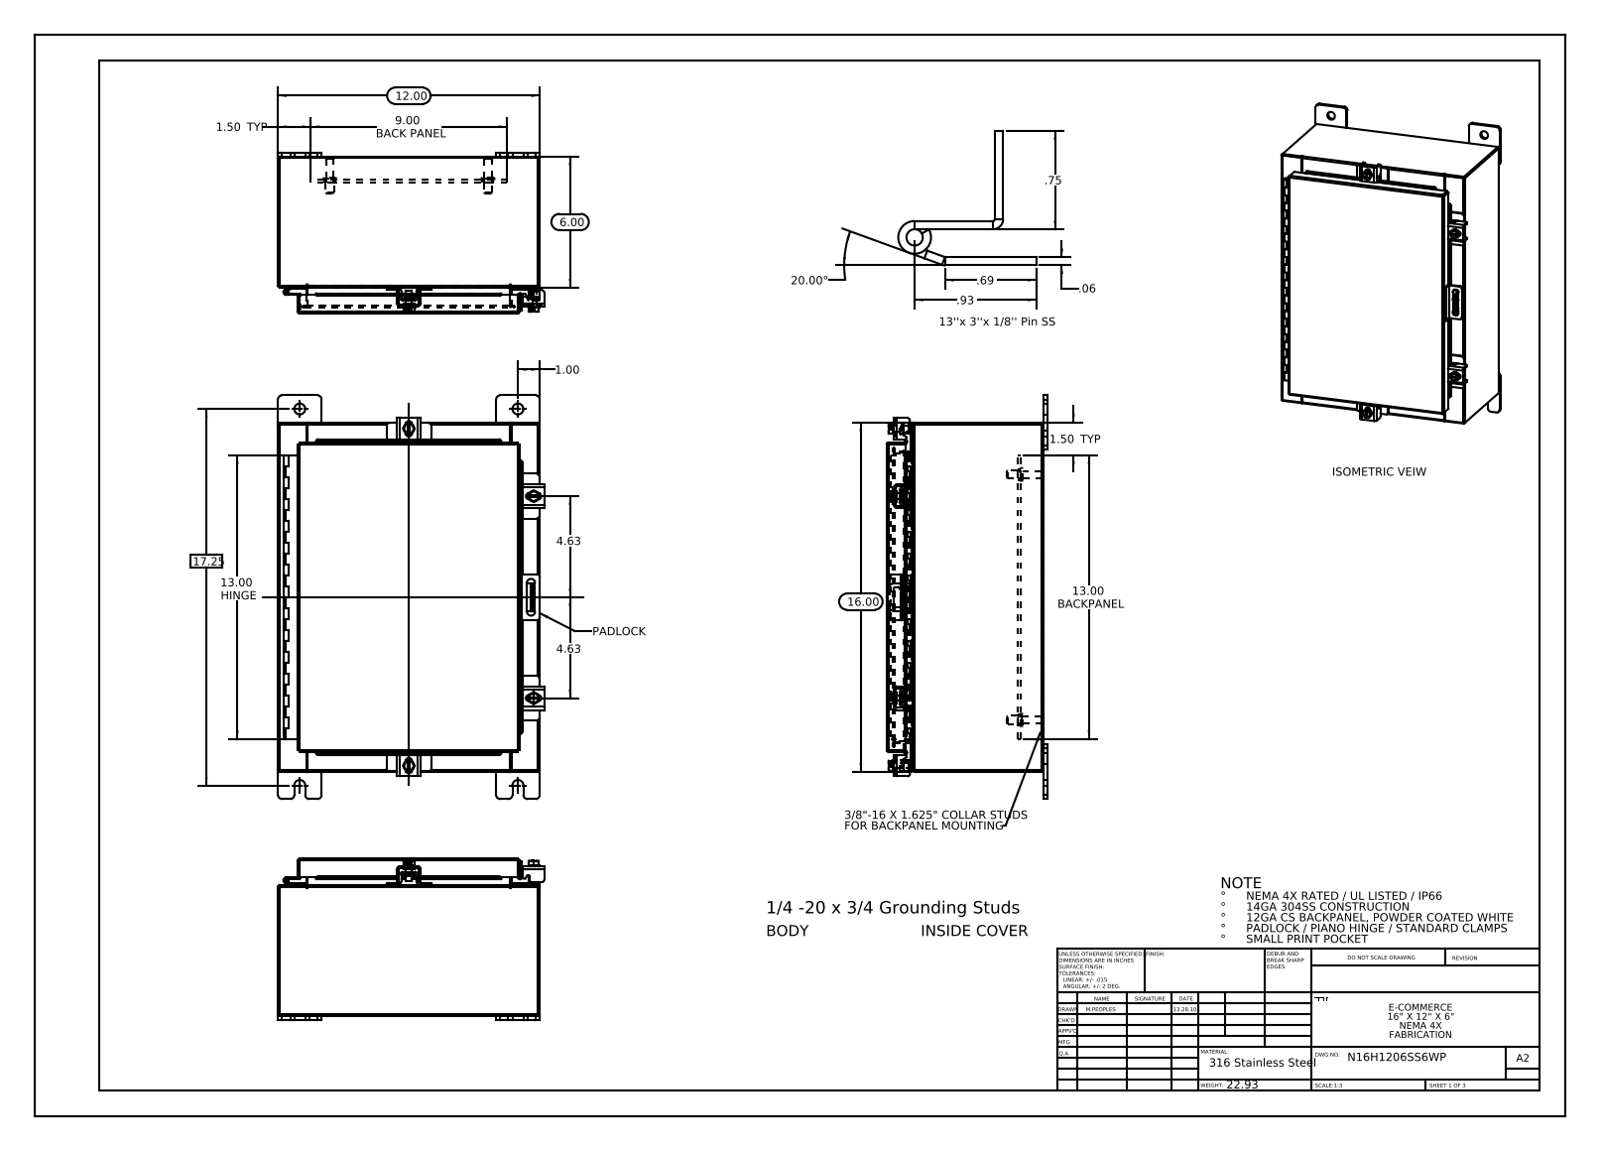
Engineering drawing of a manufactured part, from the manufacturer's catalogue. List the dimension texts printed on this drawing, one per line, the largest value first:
20.00°
17.25
16.00
13.00 HINGE
13.00 BACKPANEL
12.00
9.00 BACK PANEL
6.00
4.63
4.63
1.50 TYP
1.50 TYP
1.00
.93
.75
.69
.06
